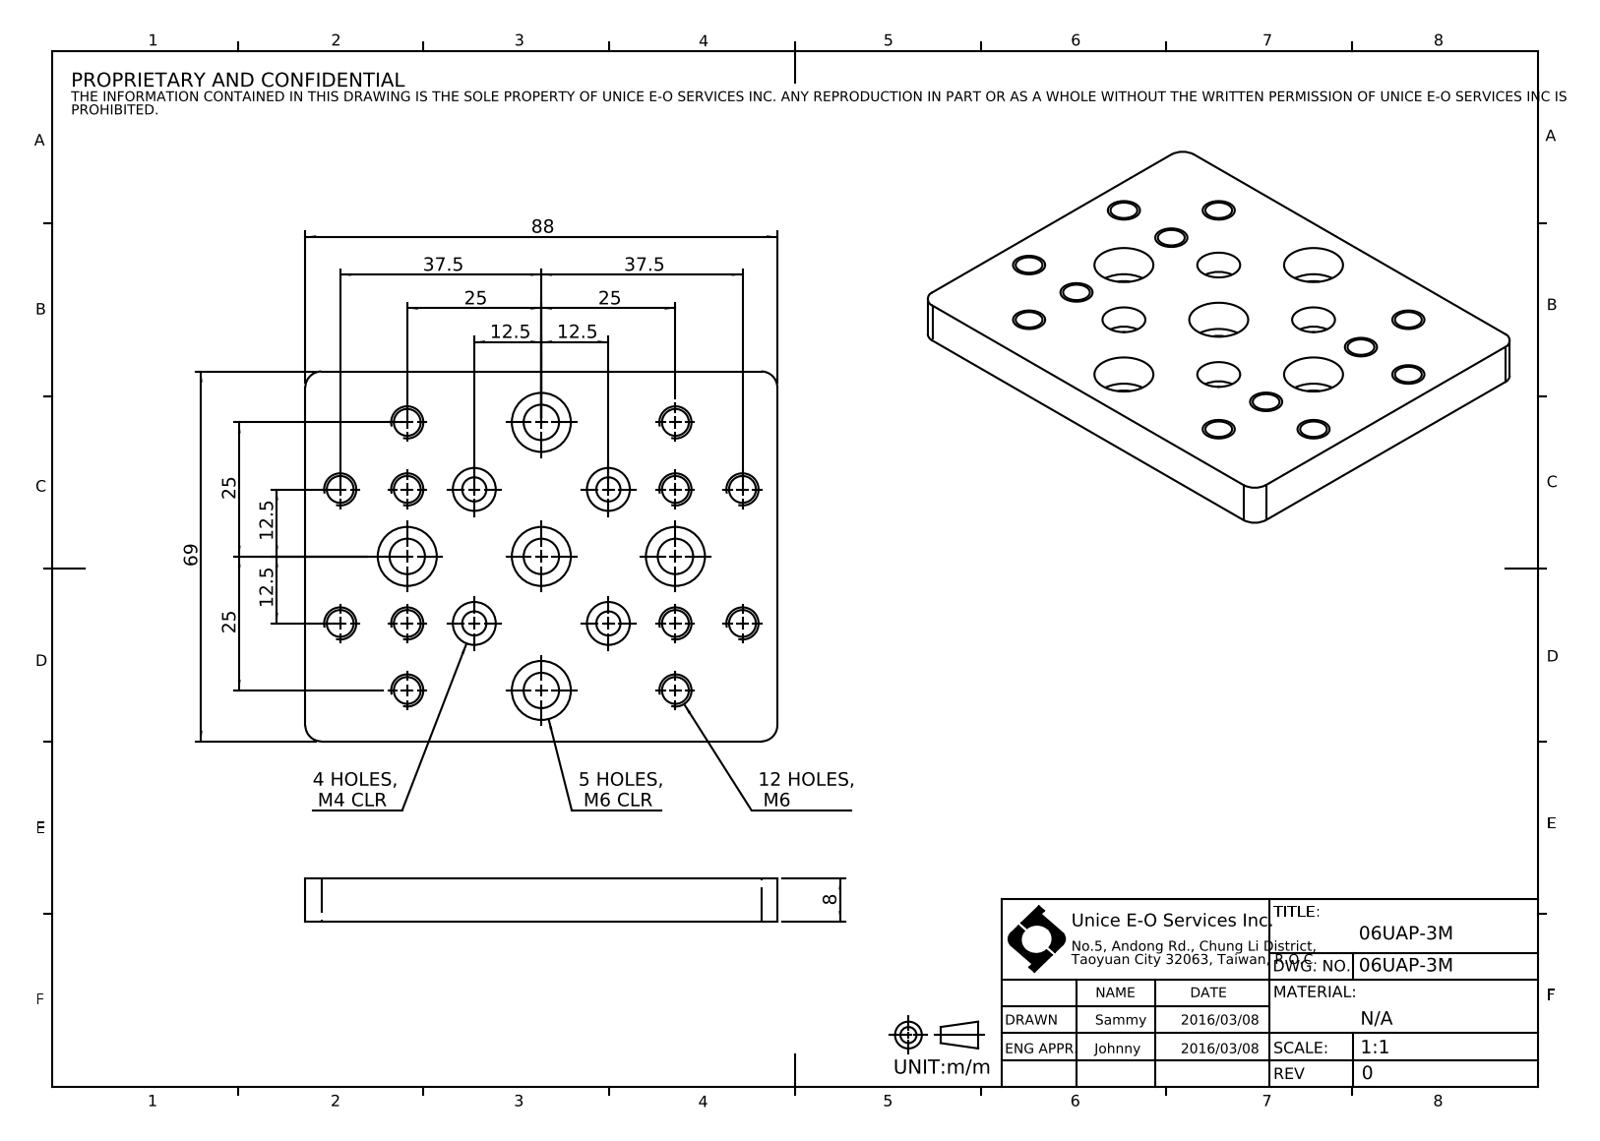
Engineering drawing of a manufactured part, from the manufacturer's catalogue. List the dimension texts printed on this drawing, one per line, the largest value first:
88
69
37.5
37.5
25
25
25
25
12.5
12.5
12.5
12.5
12 HOLES, M6
8
5 HOLES, M6 CLR
4 HOLES, M4 CLR
